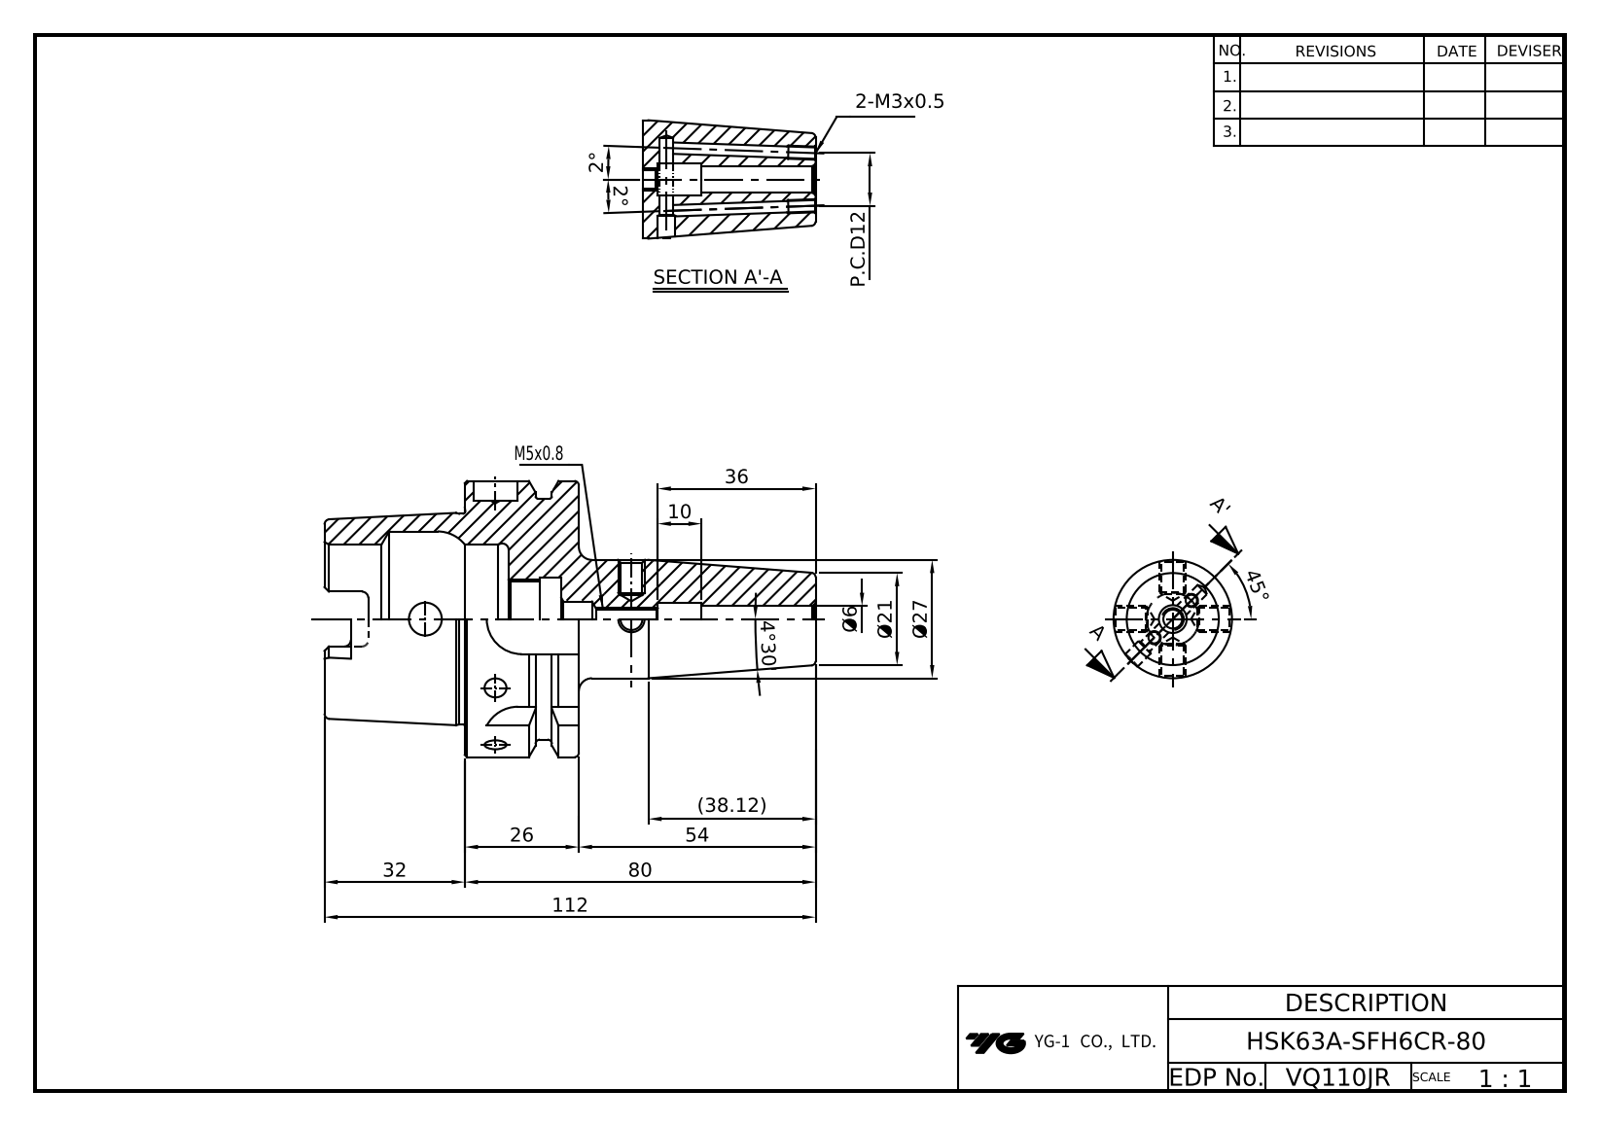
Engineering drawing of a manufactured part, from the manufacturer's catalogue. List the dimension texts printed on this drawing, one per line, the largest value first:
112
80
54
45°
(38.12)
36
32
Ø27
26
Ø21
P.C.D12
10
Ø6
4°30'
2°
2°
